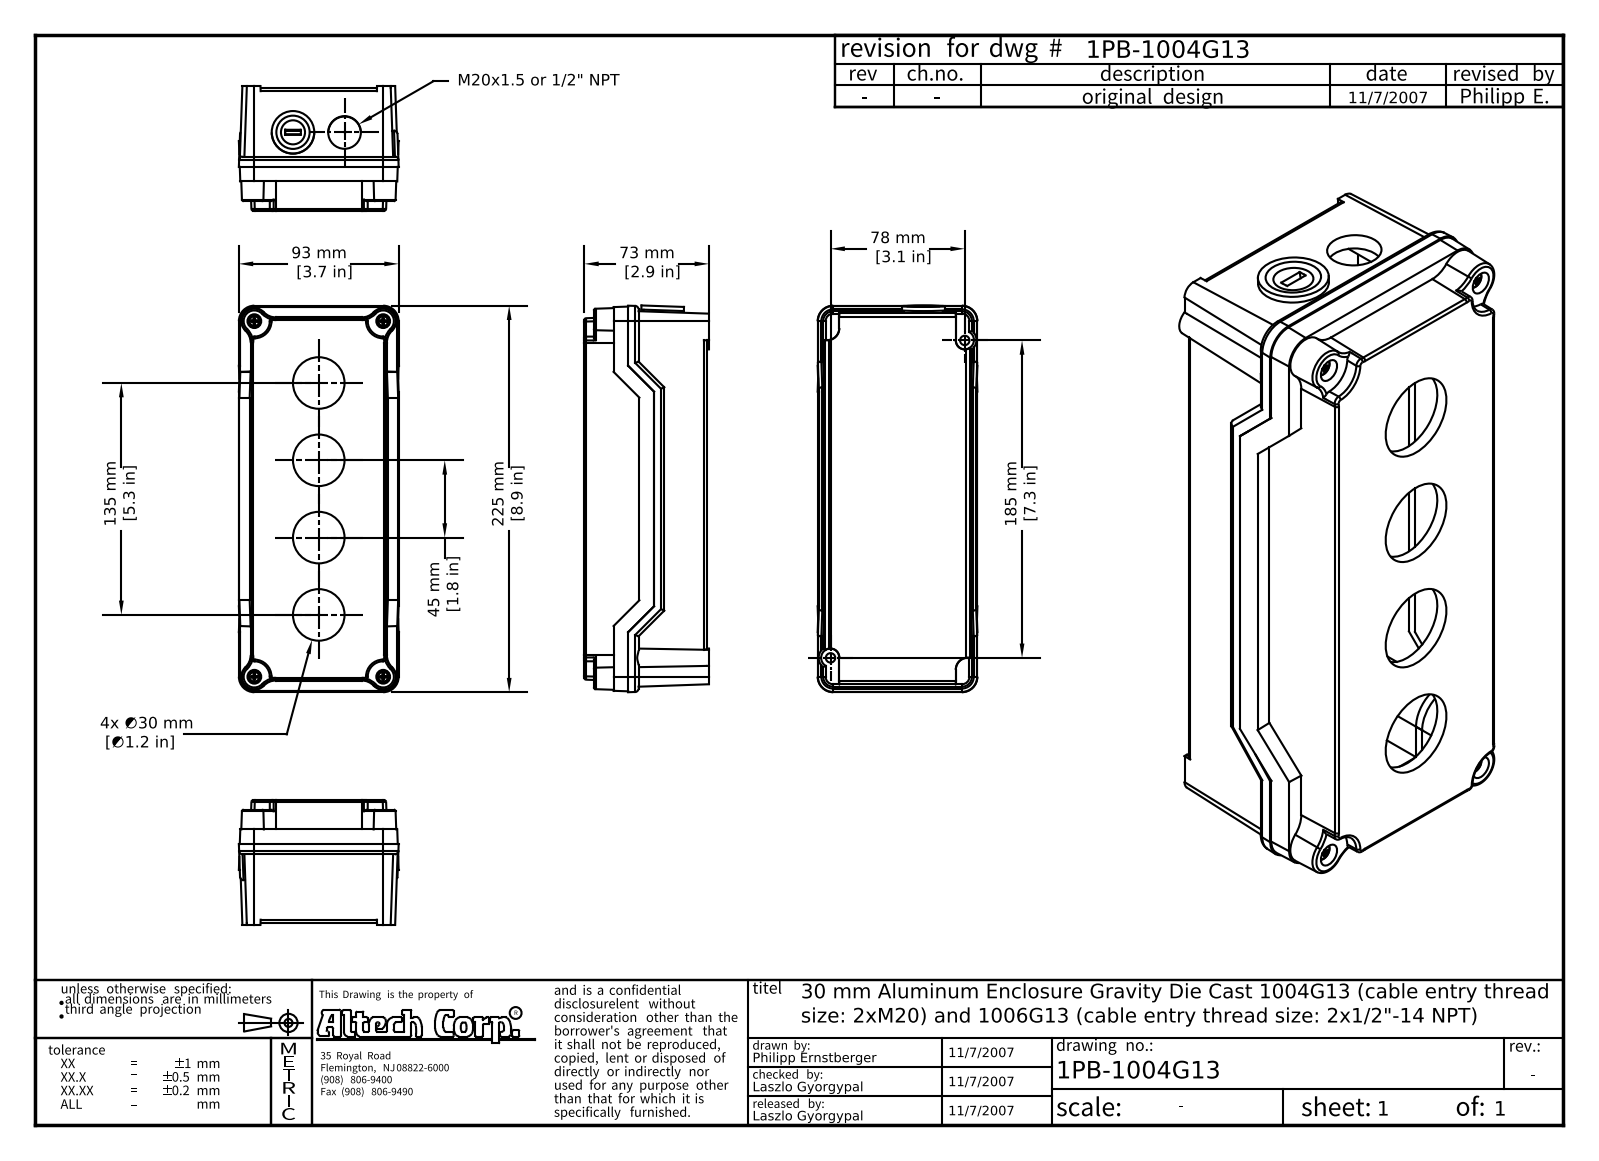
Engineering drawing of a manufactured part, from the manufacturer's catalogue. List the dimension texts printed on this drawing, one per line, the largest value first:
225 mm [8.9 in]
185 mm [7.3 in]
135 mm [5.3 in]
93 mm [3.7 in]
78 mm [3.1 in]
73 mm [2.9 in]
45 mm [1.8 in]
4x ∅30 mm [∅1.2 in]
M20x1.5 or 1/2" NPT
